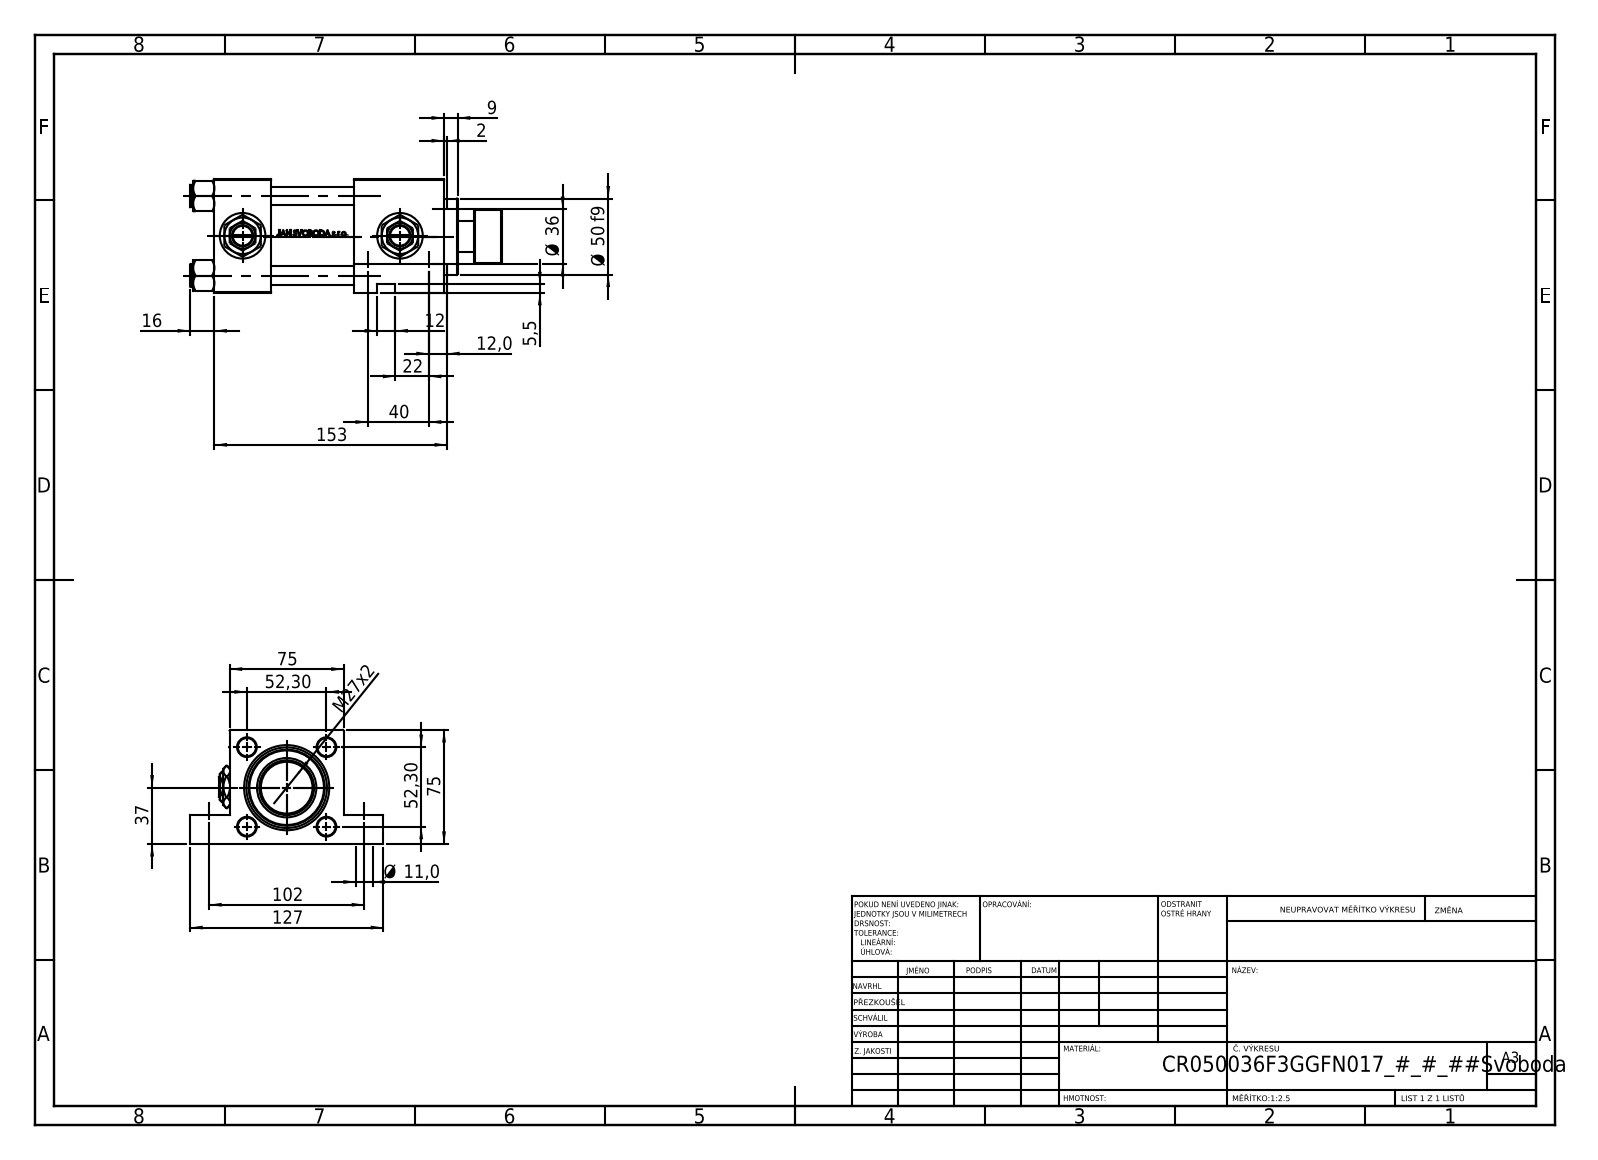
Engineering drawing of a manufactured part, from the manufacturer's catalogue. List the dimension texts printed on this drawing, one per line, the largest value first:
153
127
102
75
75
52,30
52,30
Ø 50 f9
40
37
Ø 36
M27x2
22
16
12
12,0
Ø 11,0
9
5,5
2
